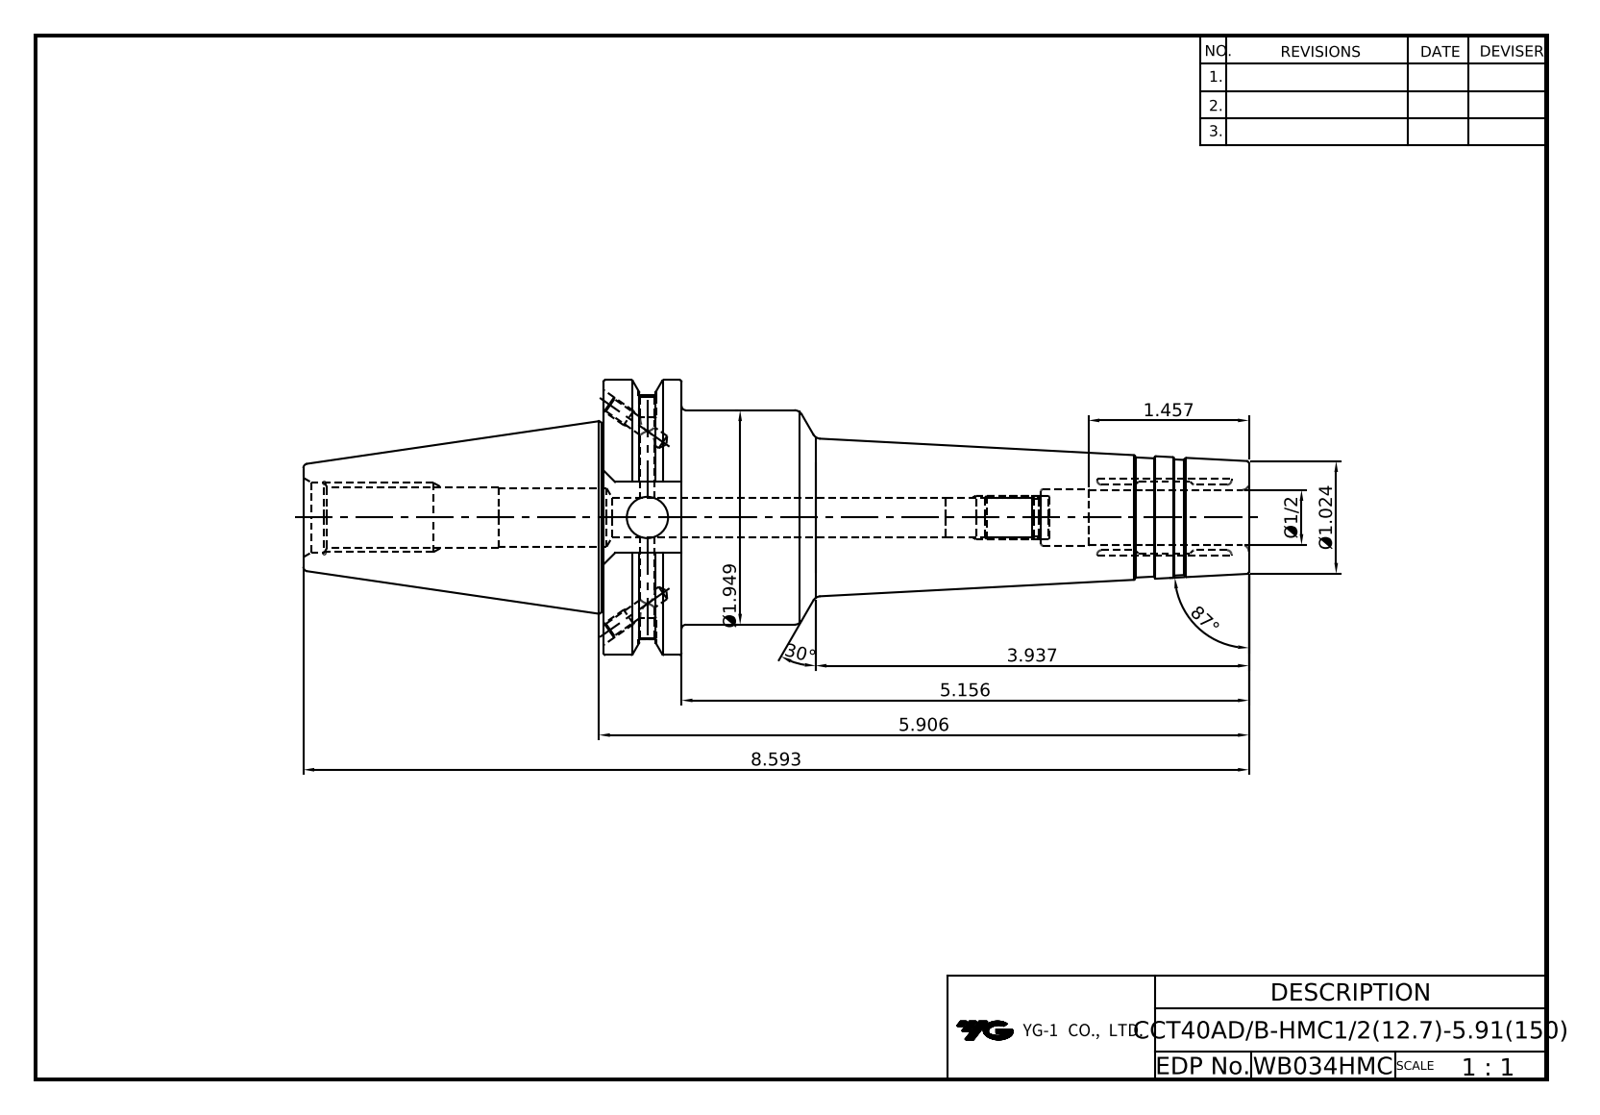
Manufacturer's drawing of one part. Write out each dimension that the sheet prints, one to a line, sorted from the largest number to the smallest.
87°
30°
8.593
5.906
5.156
3.937
Ø1.949
1.457
Ø1.024
Ø1/2
